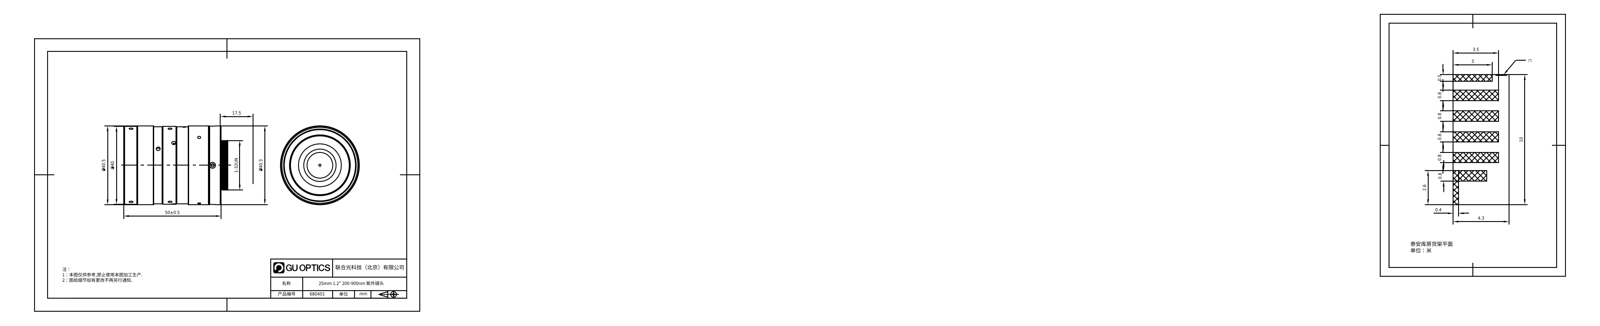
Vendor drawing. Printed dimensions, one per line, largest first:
50±0.5
Ø40.5
Ø40.3
Ø40
17.5
10
4.3
3.5
3
2.6
1-32UN
0.8
0.8
0.8
0.8
0.8
0.5
0.4
